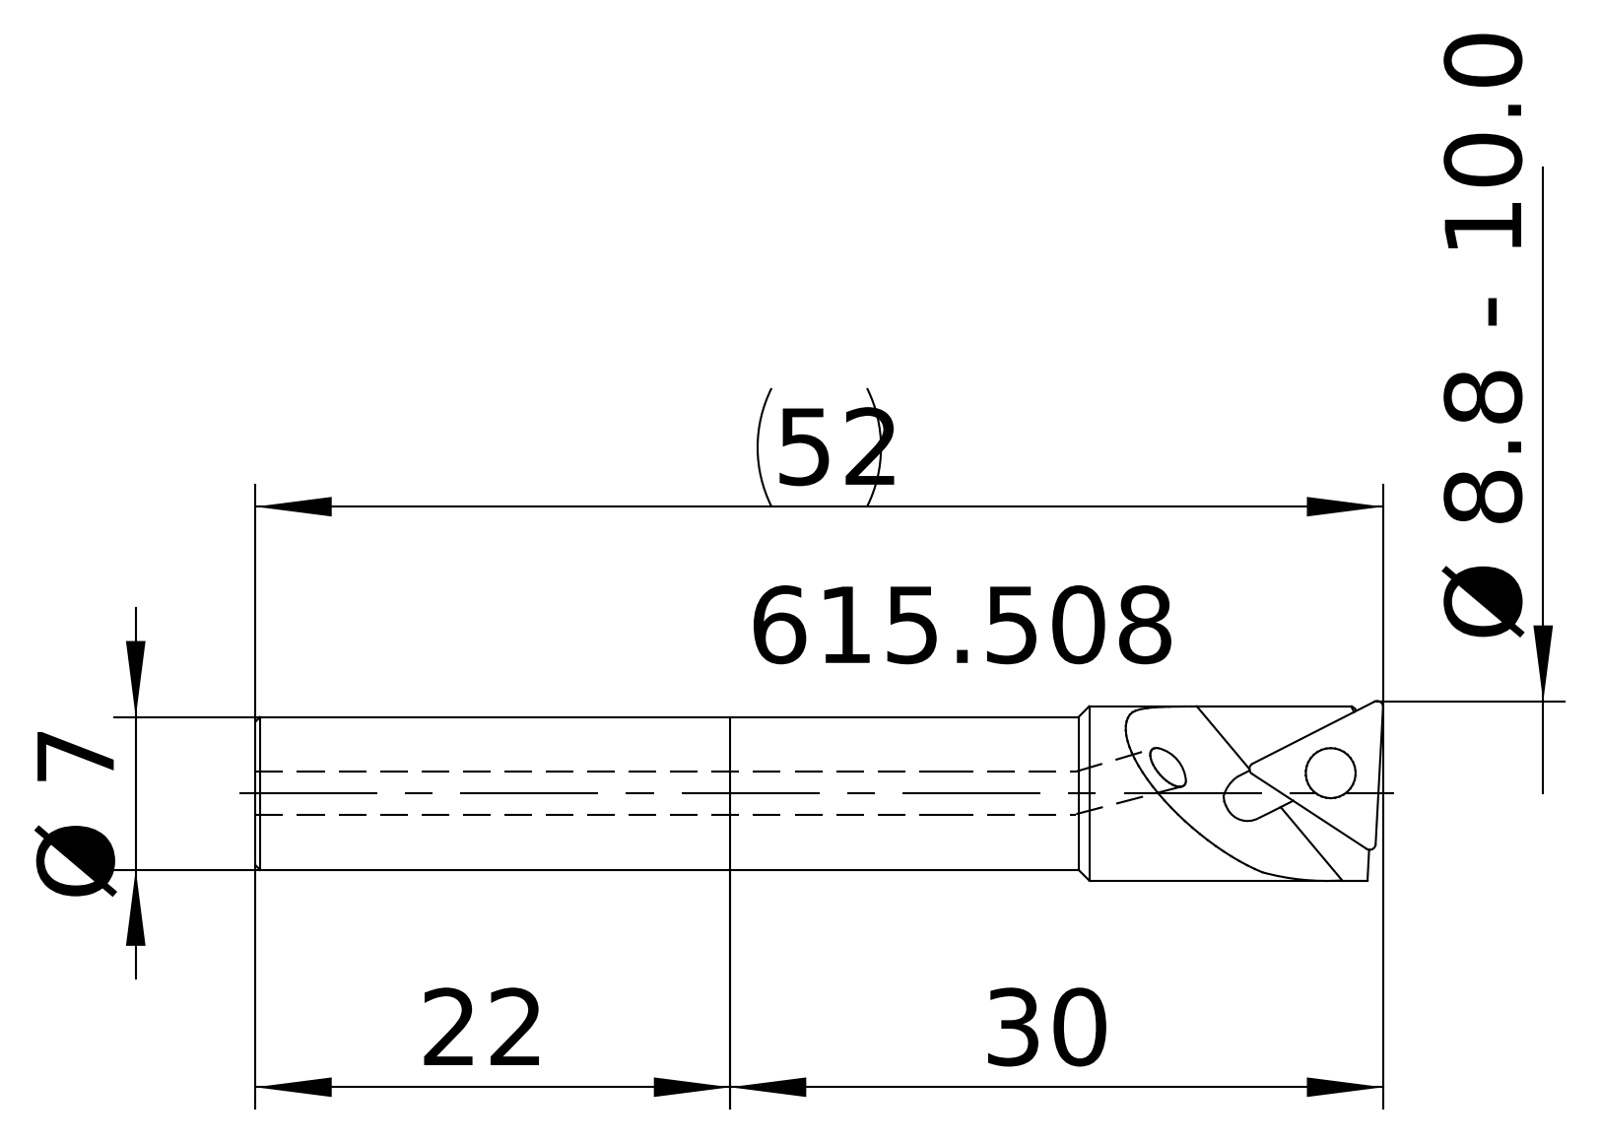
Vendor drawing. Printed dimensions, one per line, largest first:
52
30
22
Ø 8.8 - 10.0
Ø 7
